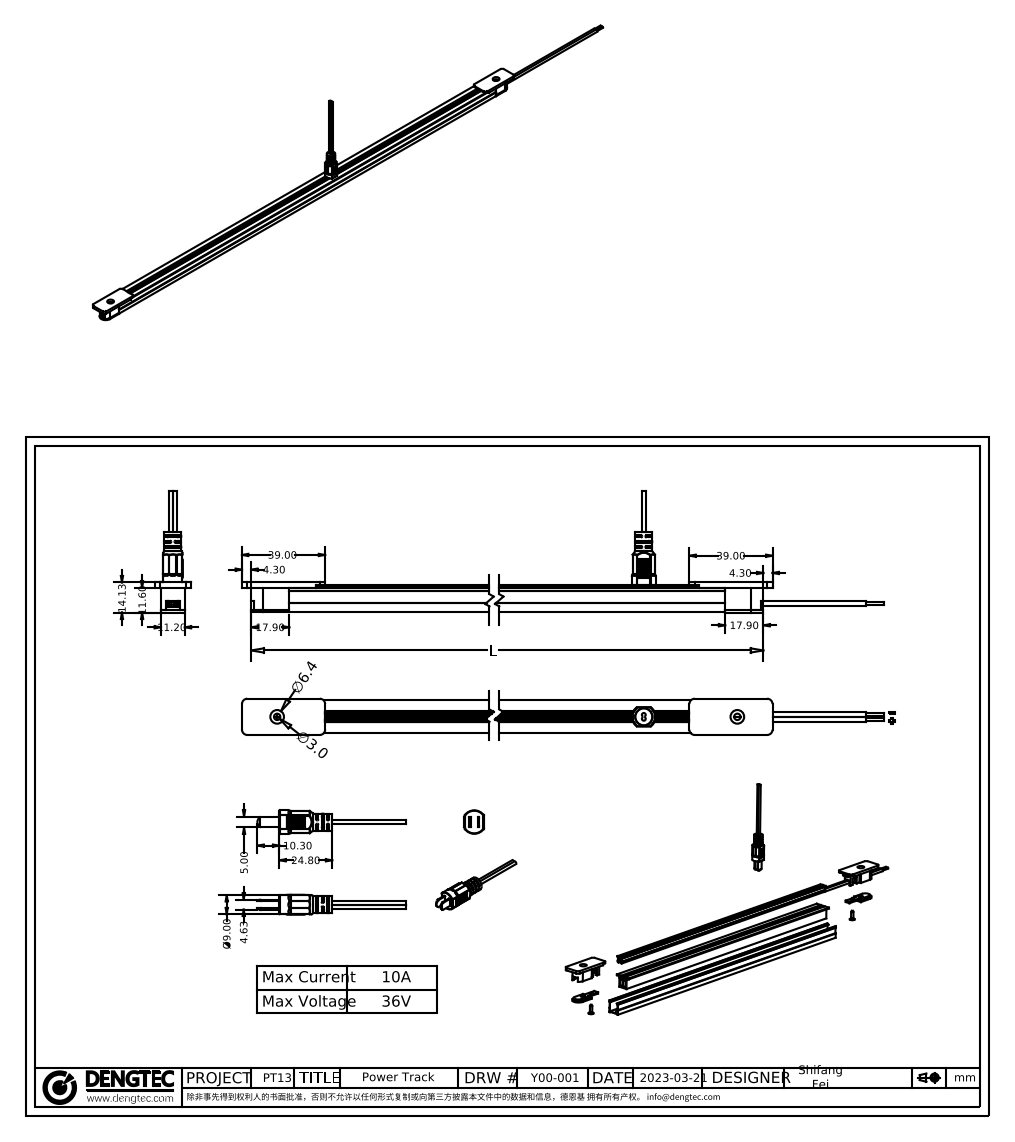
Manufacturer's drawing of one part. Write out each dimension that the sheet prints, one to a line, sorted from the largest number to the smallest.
39.00
39.00
24.80
17.90
17.90
14.13
11.60
11.20
10.30
Ø9.00
∅6.4
5.00
4.63
4.30
4.30
∅3.0
L
